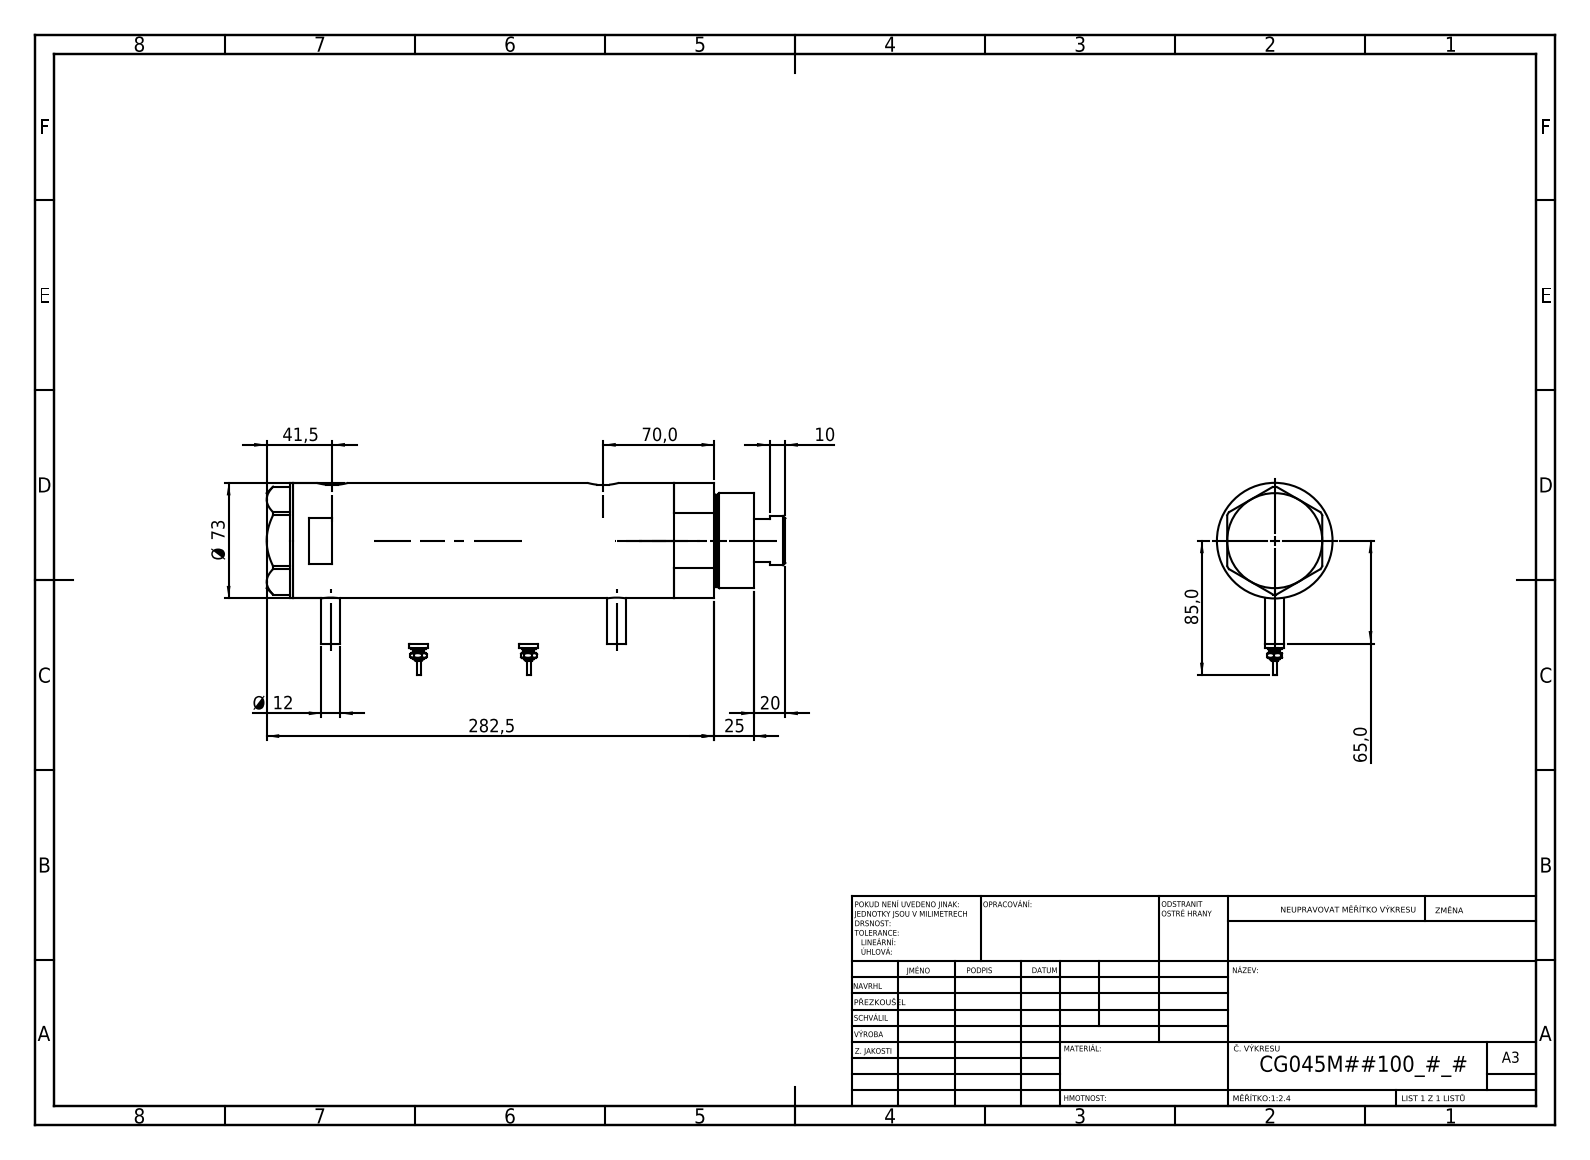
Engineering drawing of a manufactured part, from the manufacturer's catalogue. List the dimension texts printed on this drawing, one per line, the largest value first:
282,5
85,0
Ø 73
70,0
65,0
41,5
25
20
Ø 12
10
